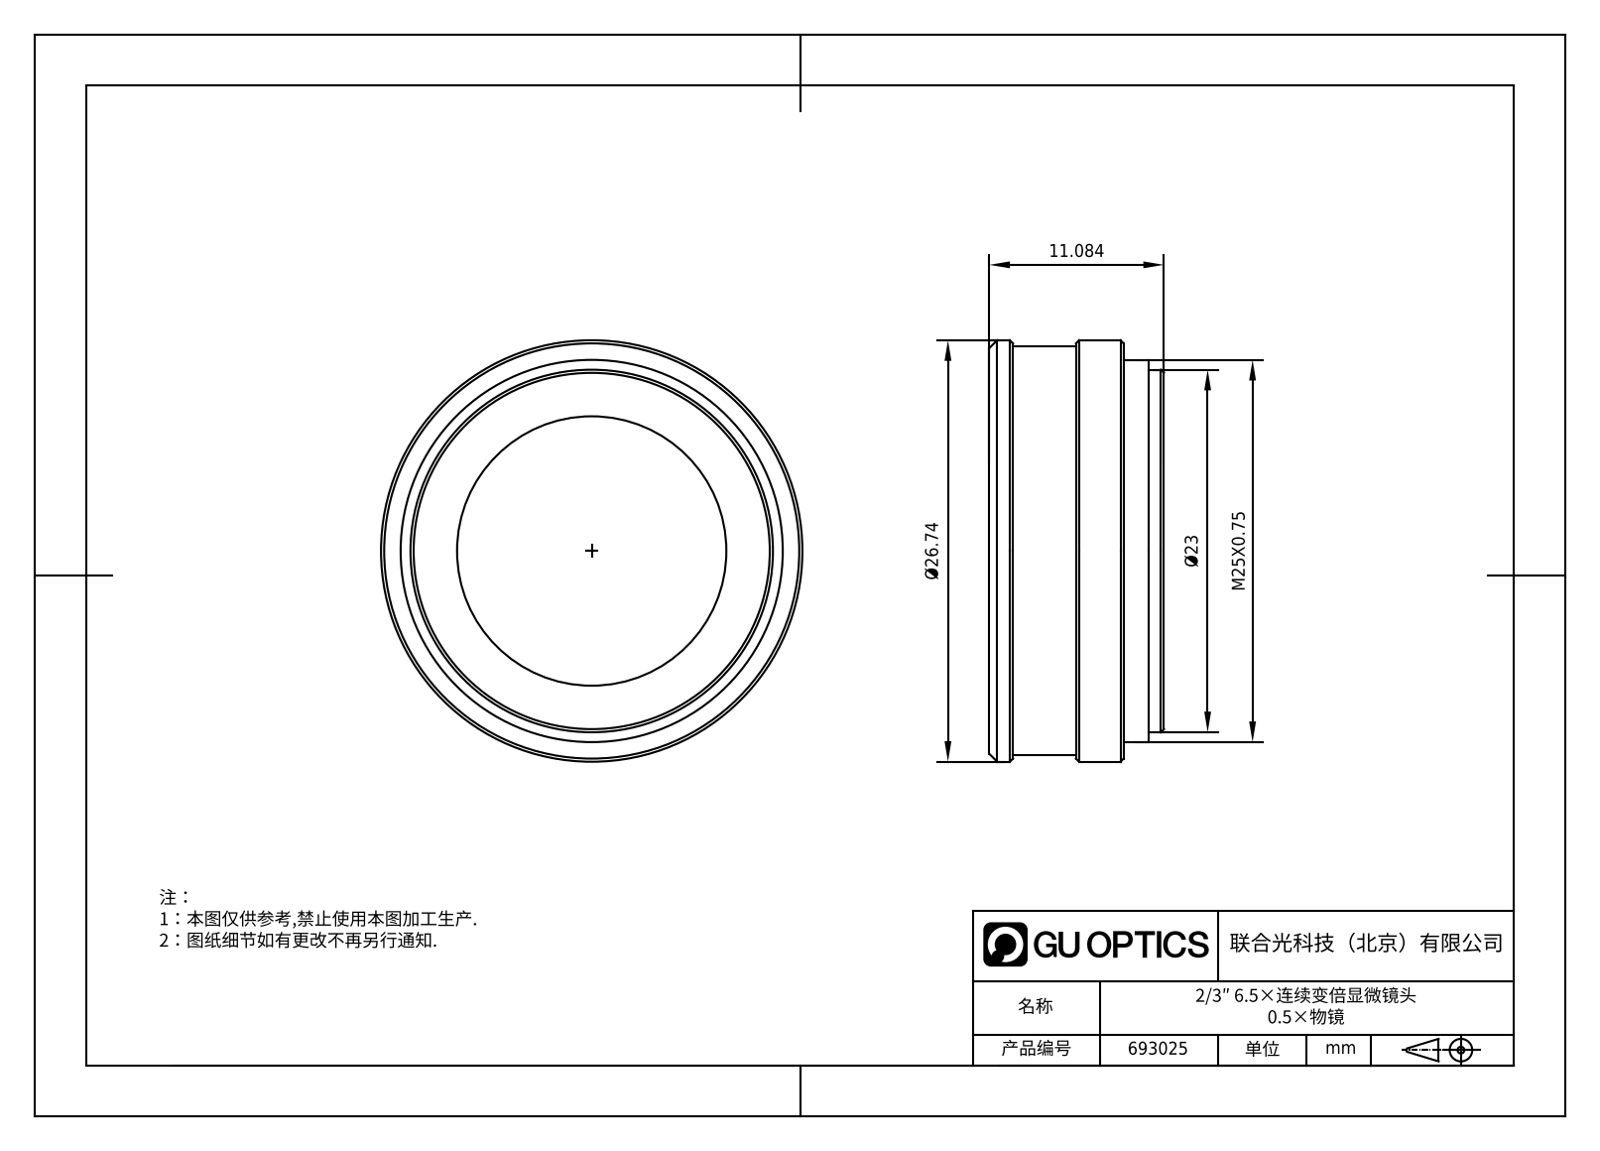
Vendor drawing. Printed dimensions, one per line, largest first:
Ø26.74
M25X0.75
Ø23
11.084
